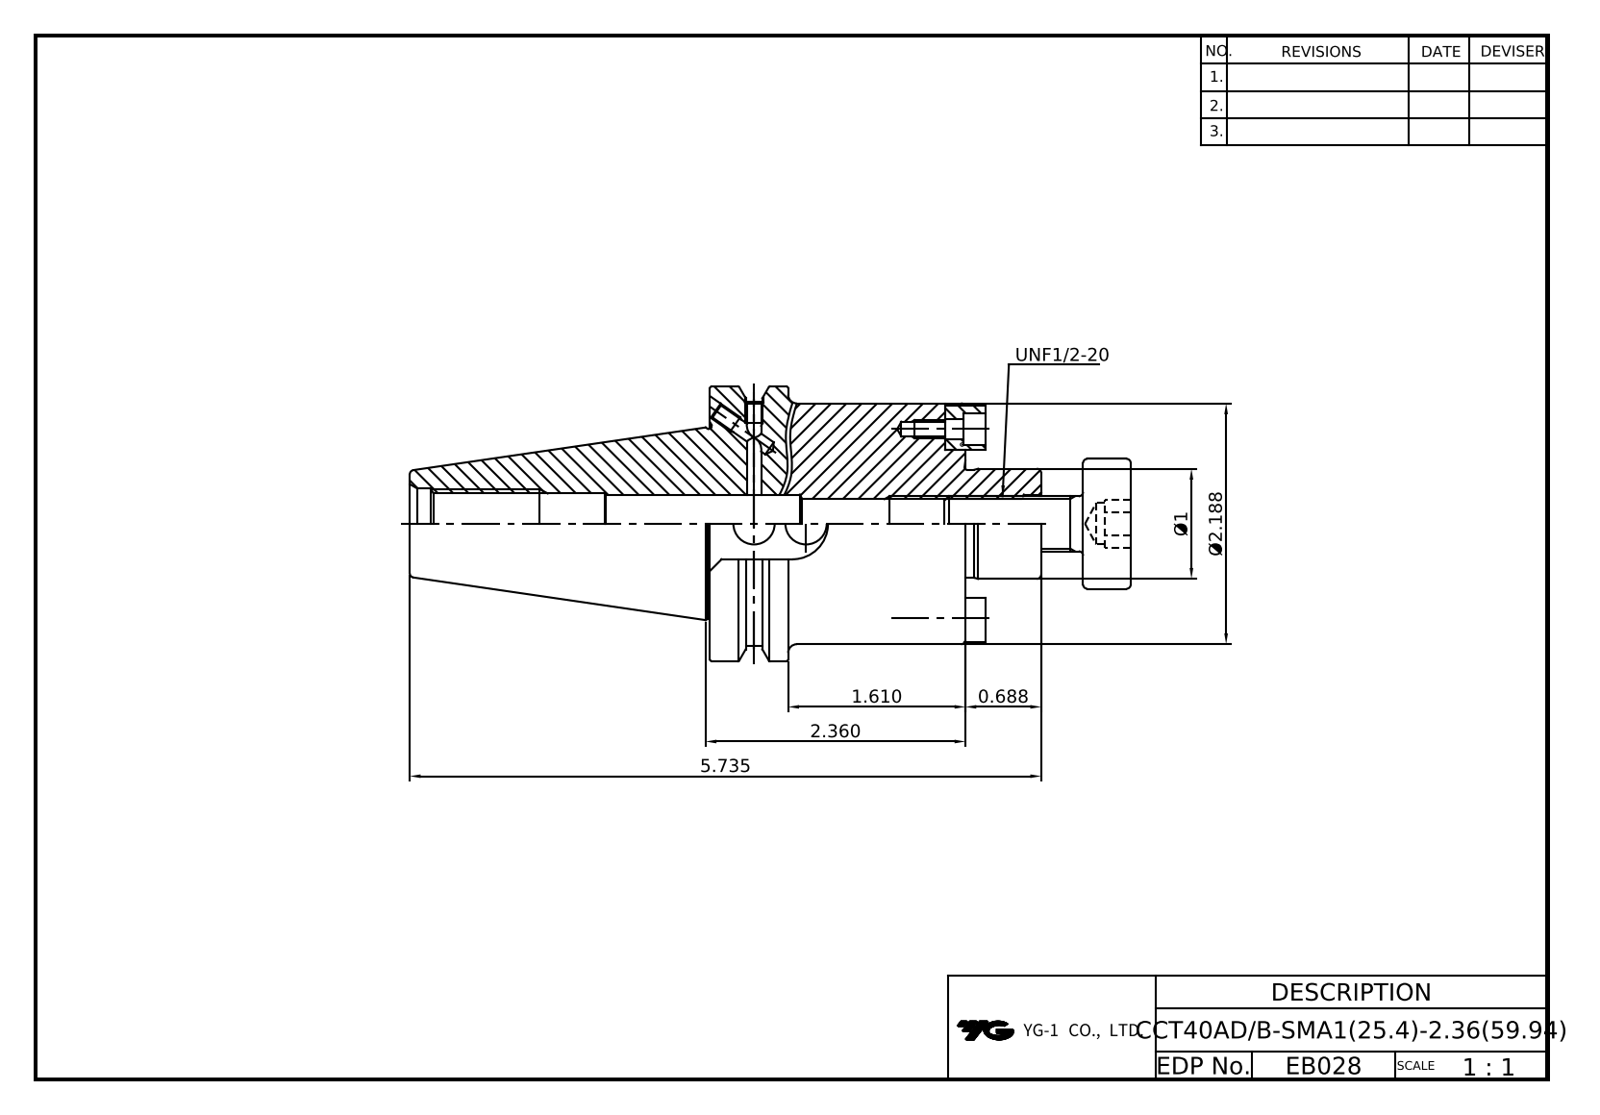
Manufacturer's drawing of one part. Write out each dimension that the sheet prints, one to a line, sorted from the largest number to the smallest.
5.735
2.360
Ø2.188
1.610
Ø1
0.688
